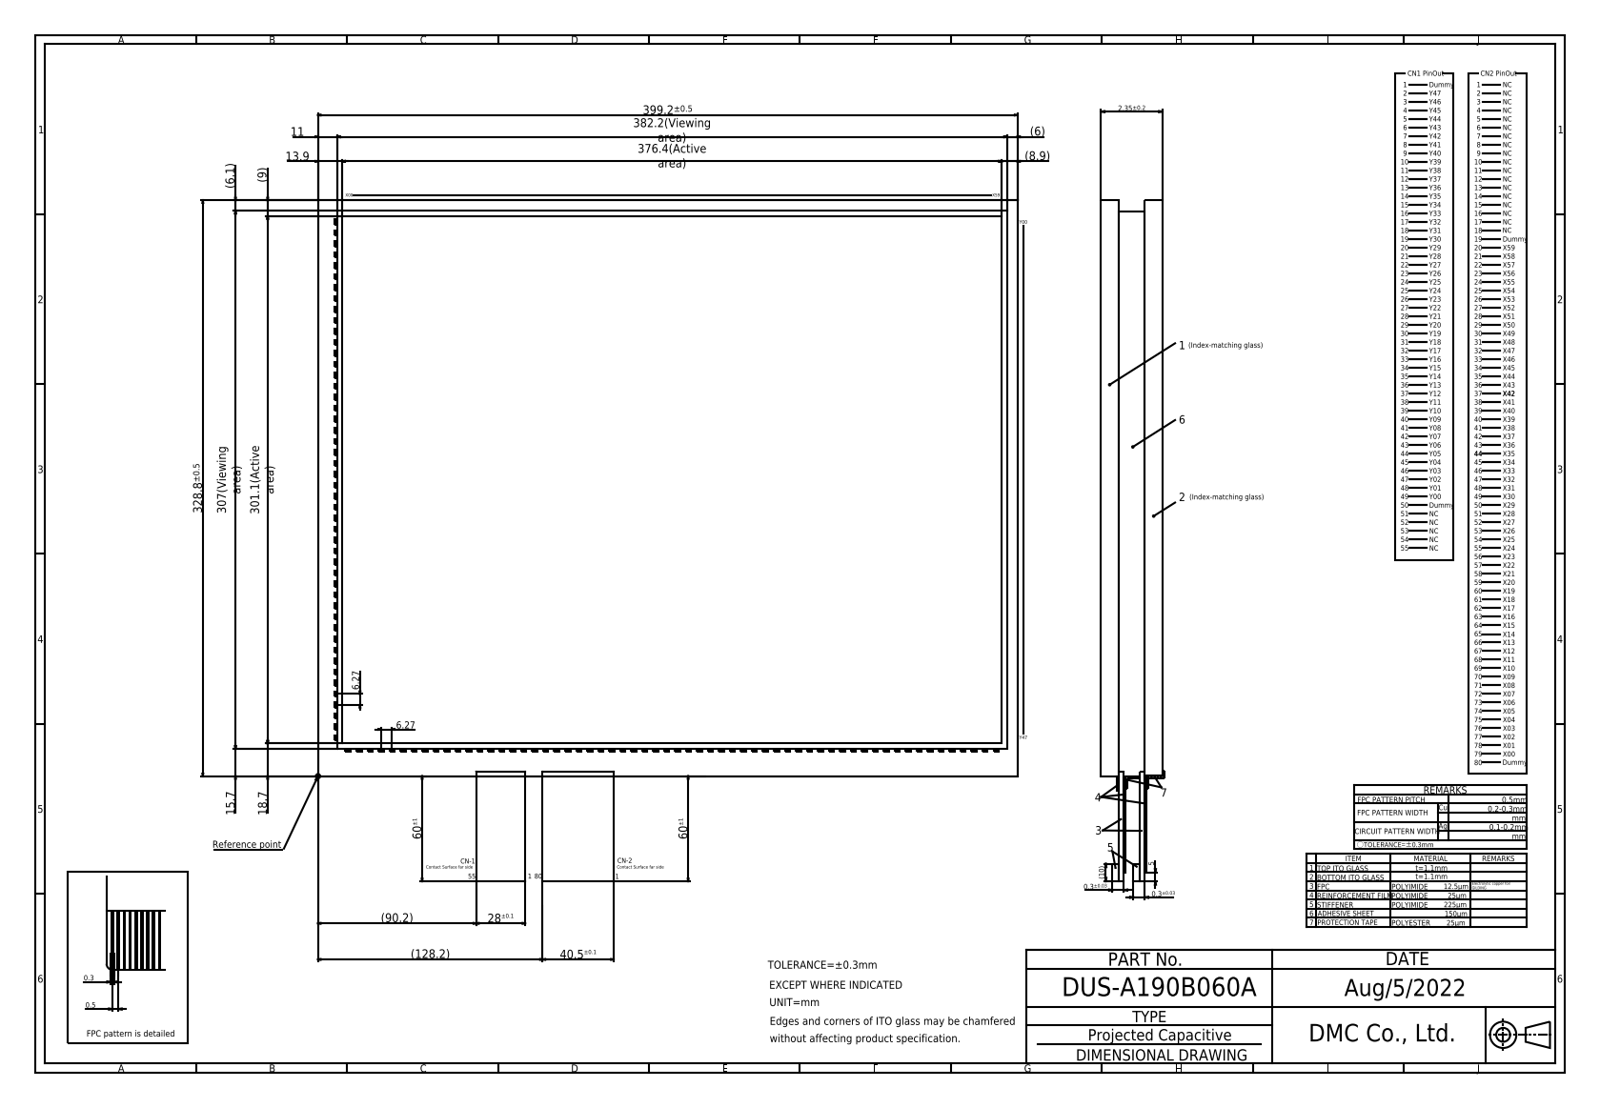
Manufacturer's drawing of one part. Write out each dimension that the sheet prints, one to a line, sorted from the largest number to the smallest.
399.2±0.5
382.2(Viewing area)
376.4(Active area)
328.8±0.5
307(Viewing area)
301.1(Active area)
(128.2)
(90.2)
60±1
60±1
40.5±0.1
28±0.1
18.7
15.7
13.9
11
(10)
(9)
(8.9)
6.27
6.27
(6.1)
(6)
5
2.35±0.2
0.5
0.3
0.3±0.03
0.3±0.03
